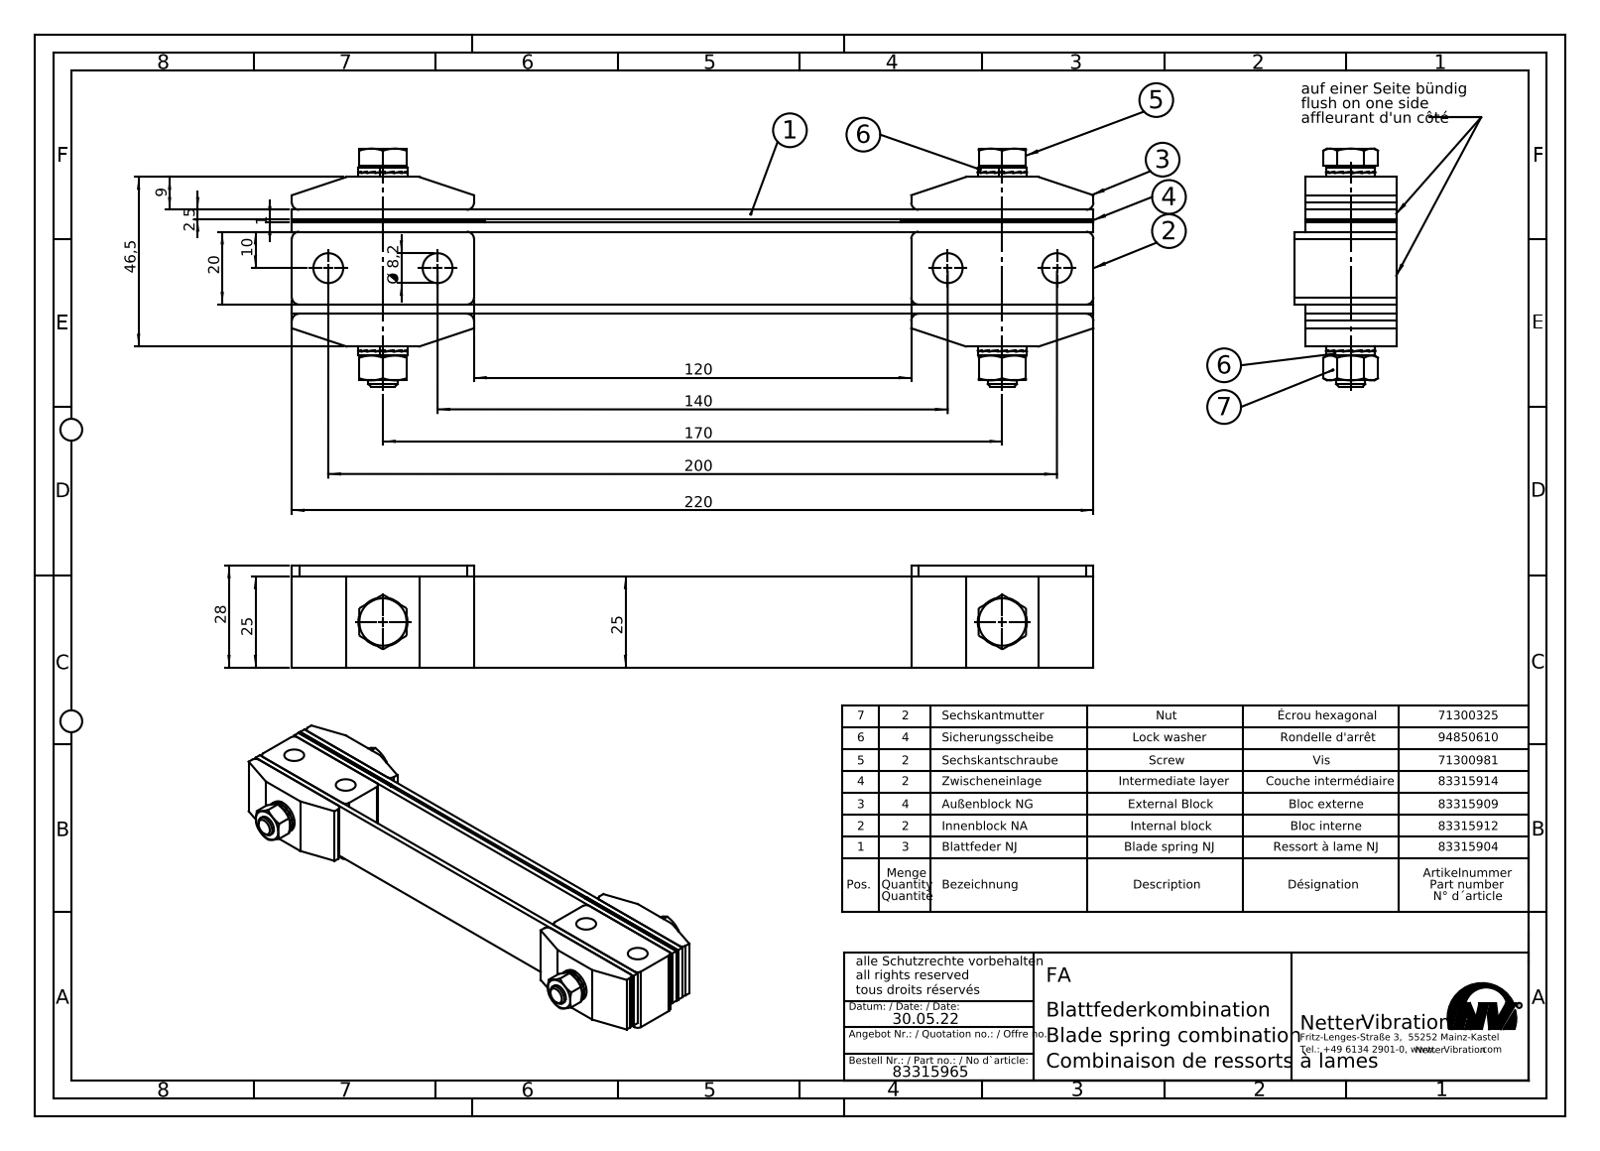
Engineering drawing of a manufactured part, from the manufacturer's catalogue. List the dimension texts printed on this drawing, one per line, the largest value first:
220
200
170
140
120
46,5
28
25
25
20
10
9
Ø 8,2
2,5
1
